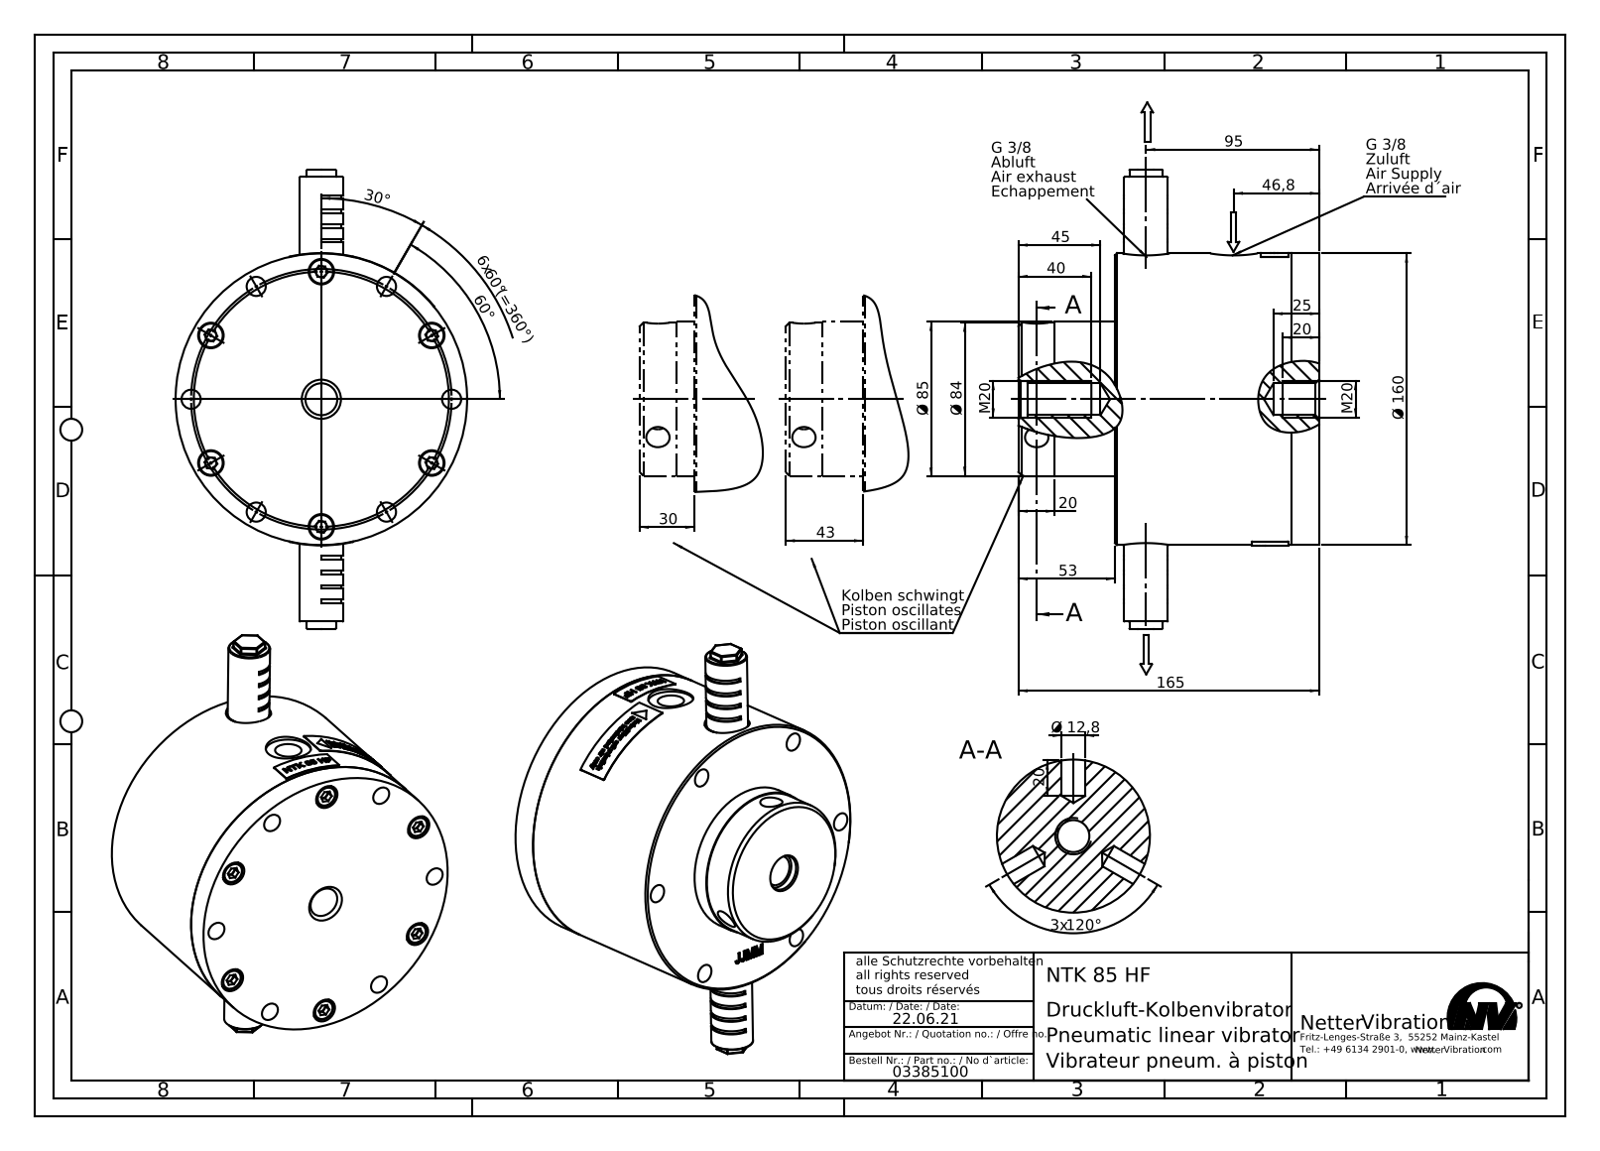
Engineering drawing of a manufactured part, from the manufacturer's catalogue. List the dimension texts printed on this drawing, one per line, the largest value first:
165
Ø 160
3x 120°
95
Ø 85
Ø 84
6x 60° (=360°)
60°
53
46,8
45
43
40
30°
30
25
M 20
20
M 20
20
20
Ø 12,8
